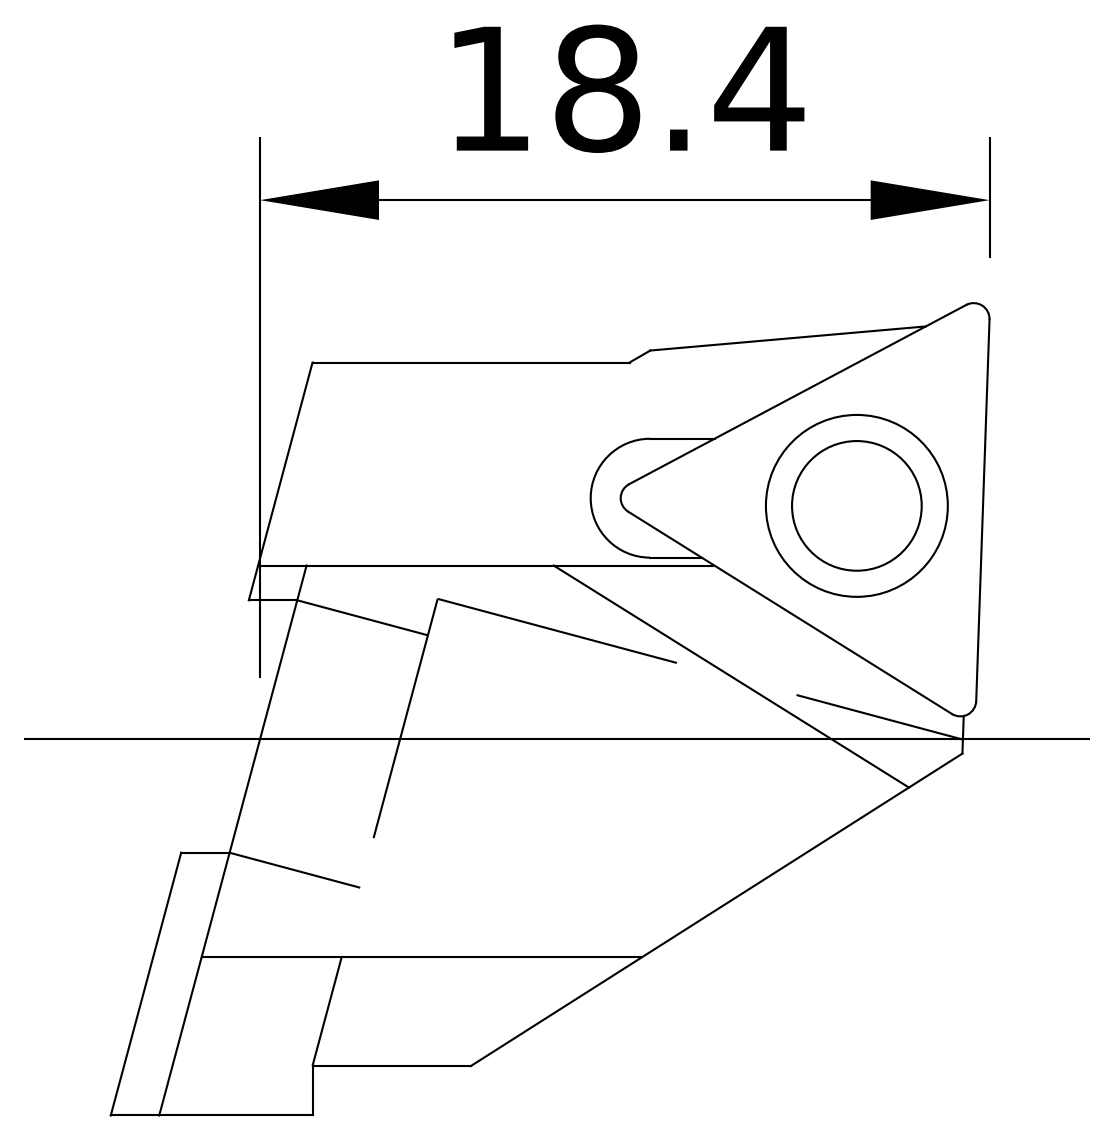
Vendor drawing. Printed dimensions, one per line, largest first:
18.4
